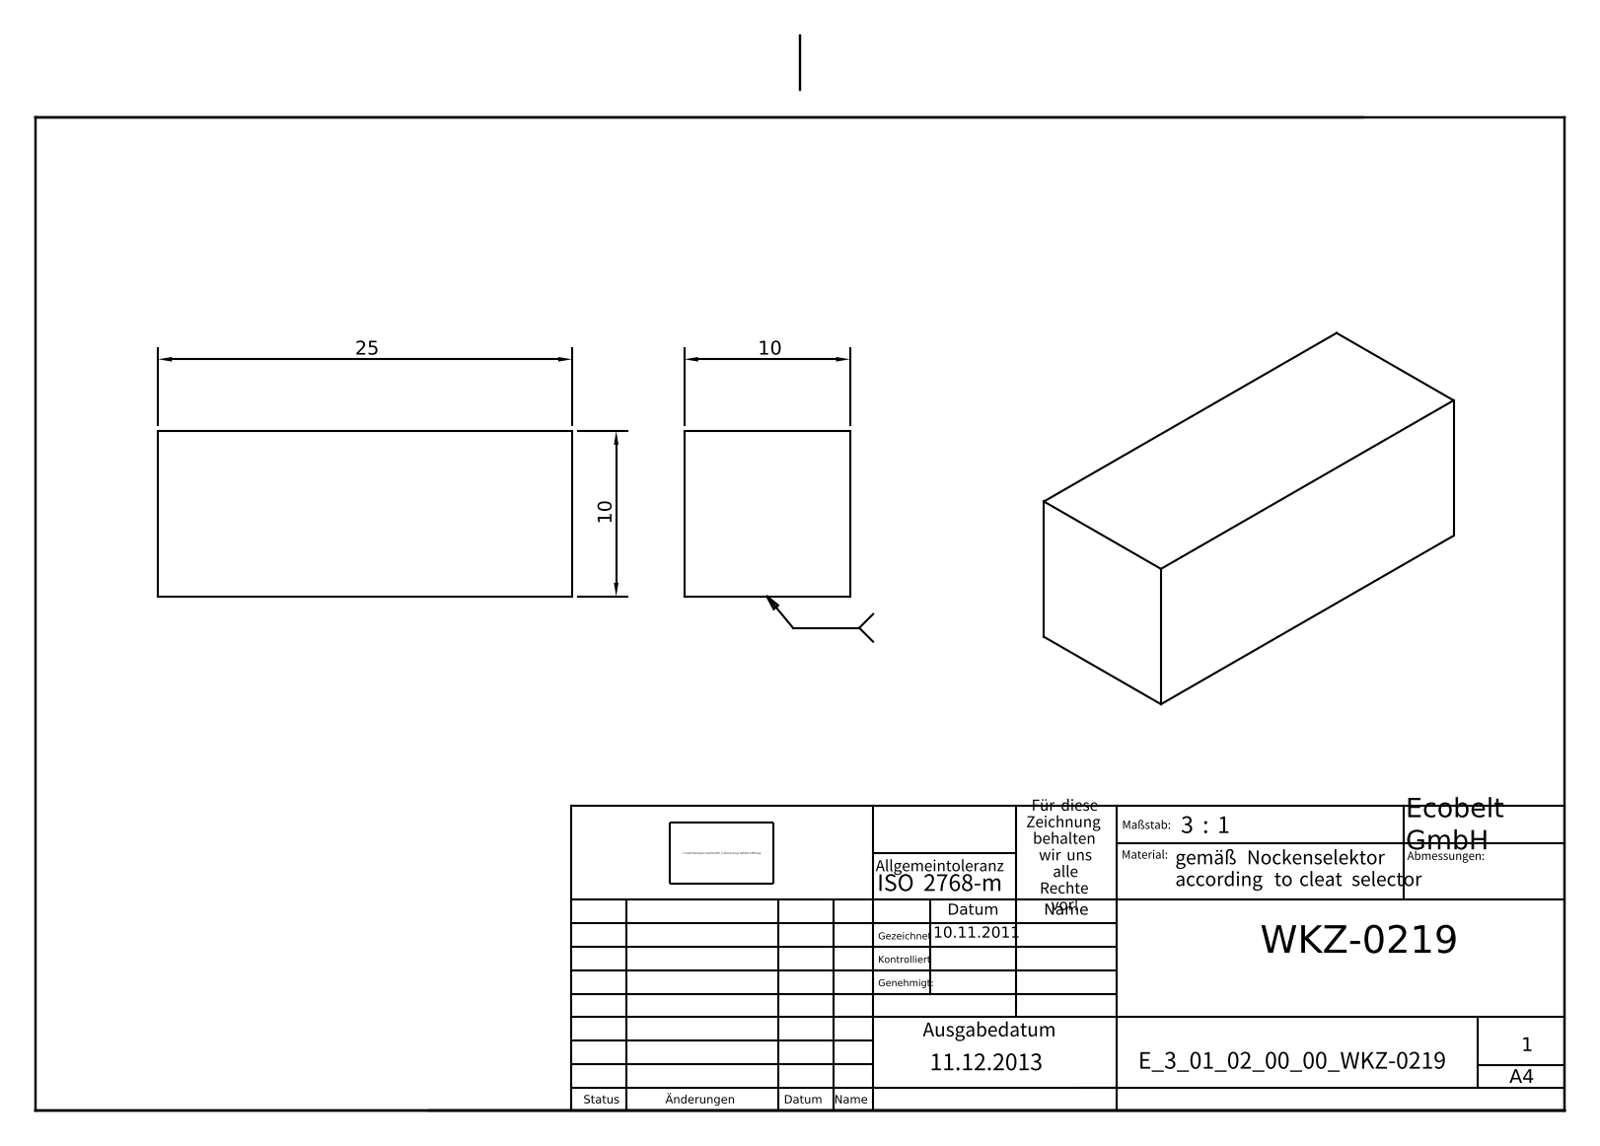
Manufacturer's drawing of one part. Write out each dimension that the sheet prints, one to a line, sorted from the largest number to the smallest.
25
10
10
